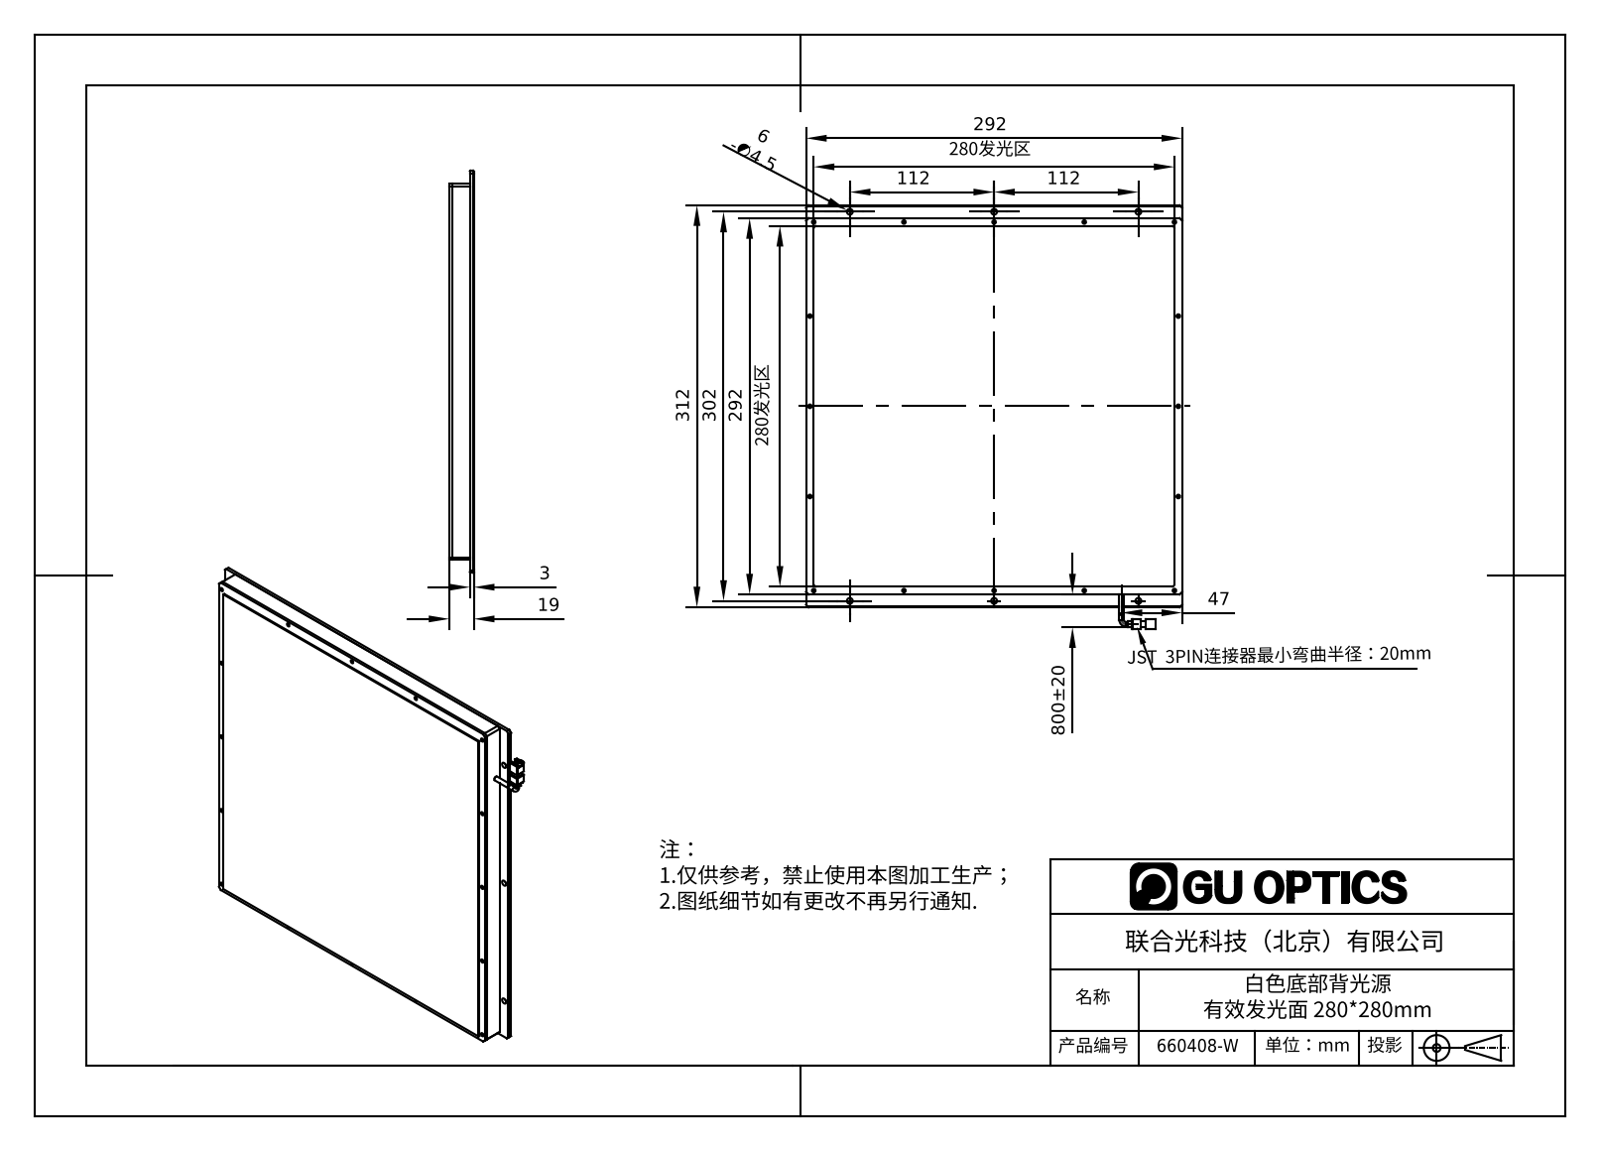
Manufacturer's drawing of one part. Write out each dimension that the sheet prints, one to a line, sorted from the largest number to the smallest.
800±20
312
302
292
292
280发光区
280发光区
112
112
47
19
6 -∅4.5
3
